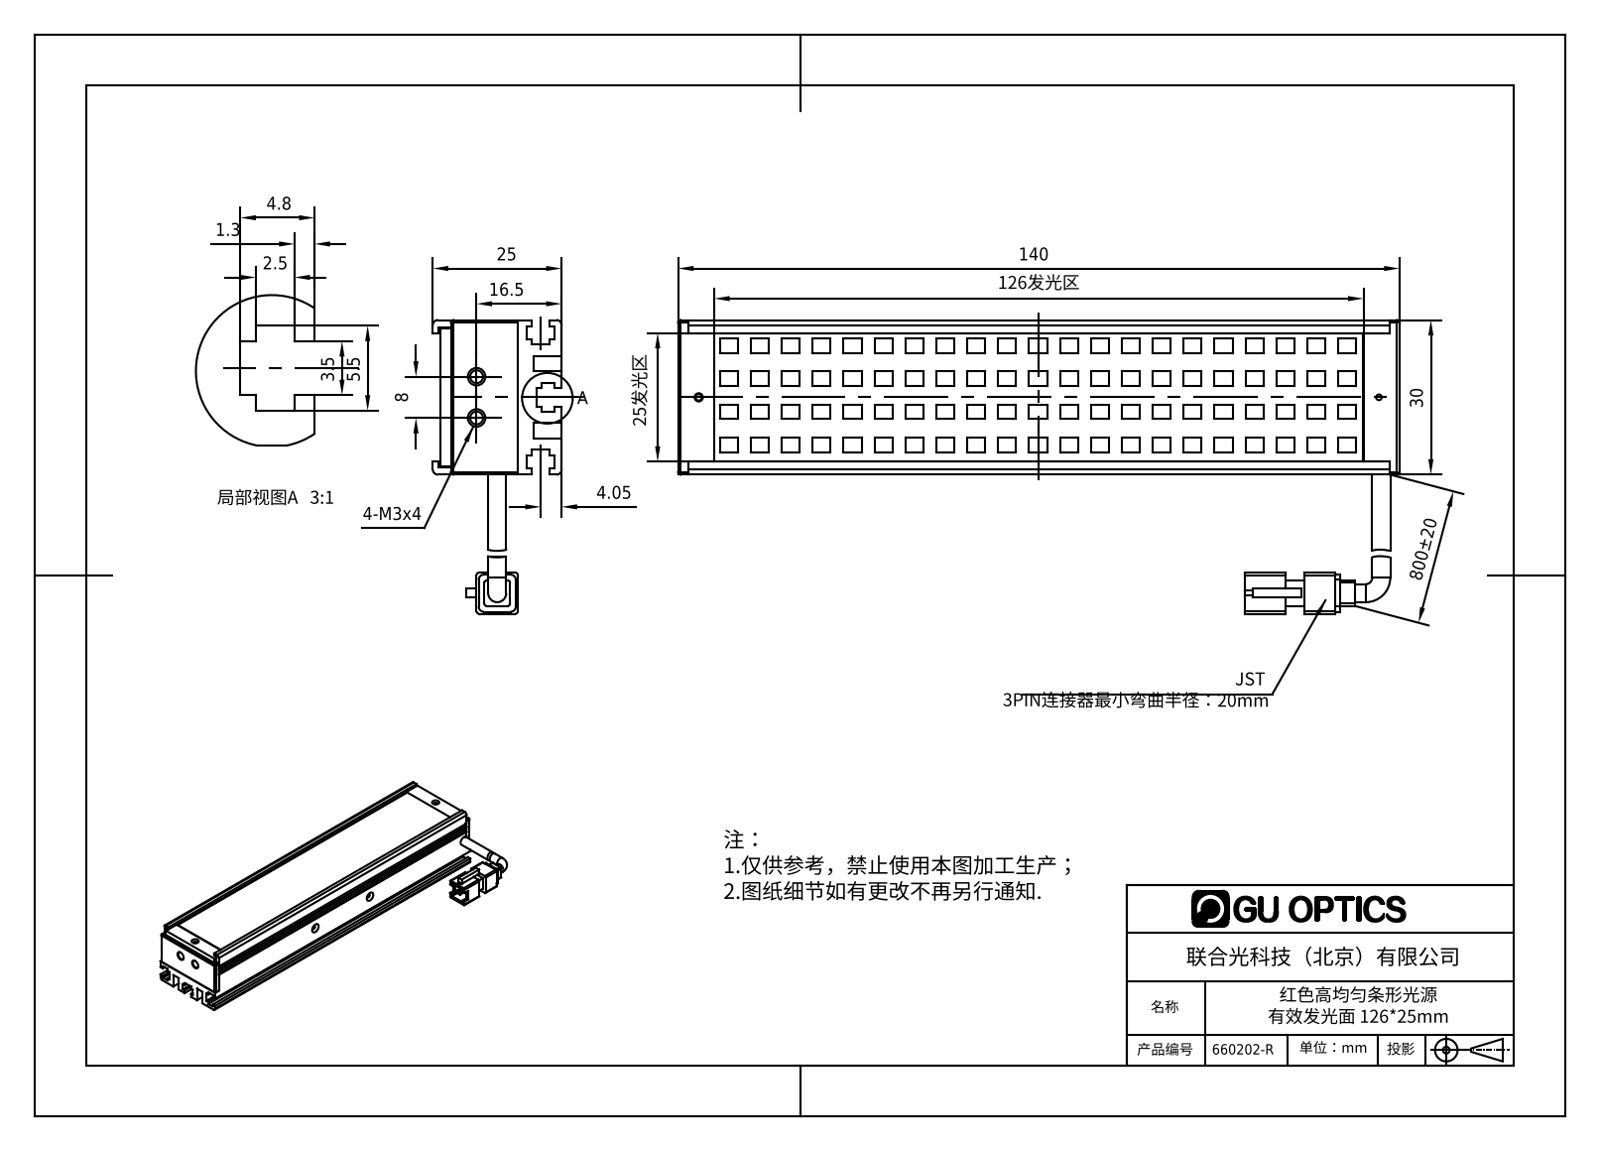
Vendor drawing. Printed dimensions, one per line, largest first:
800±20
140
126发光区
30
25发光区
25
16.5
8
5.5
4.8
4.05
3.5
2.5
1.3
